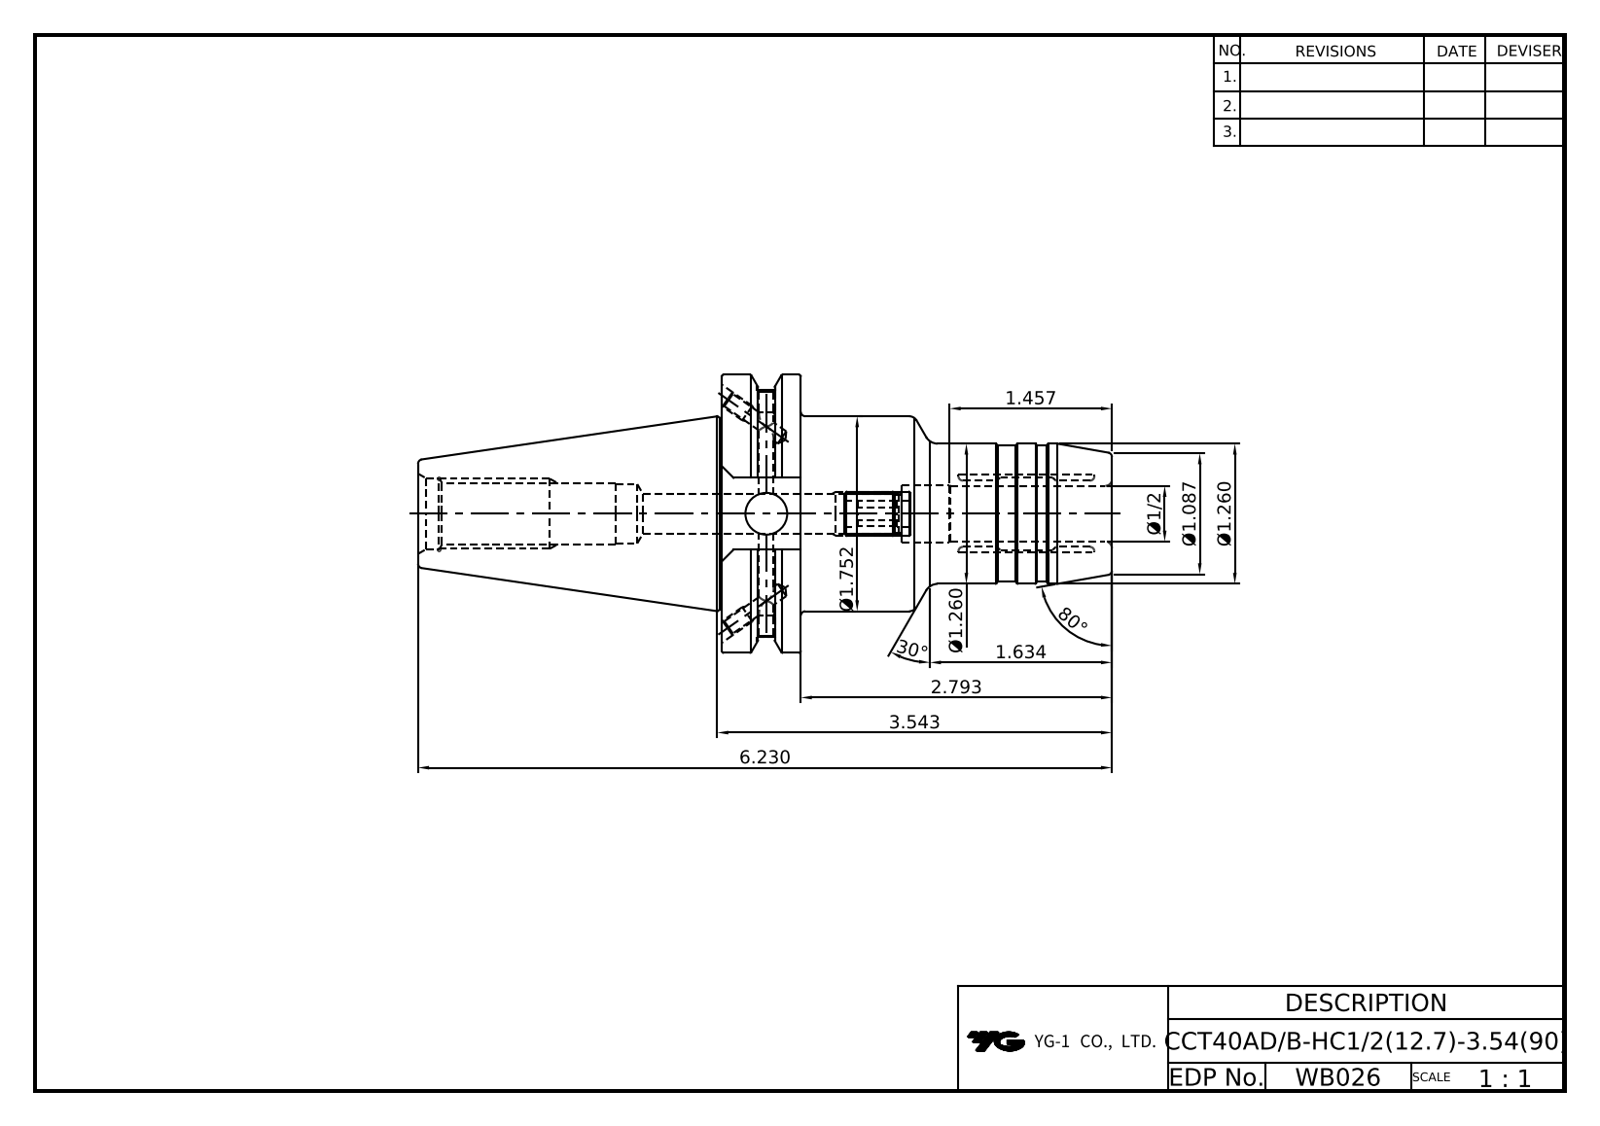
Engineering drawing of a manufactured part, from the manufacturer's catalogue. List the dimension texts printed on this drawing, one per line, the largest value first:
80°
30°
6.230
3.543
2.793
Ø1.752
1.634
1.457
Ø1.260
Ø1.260
Ø1.087
Ø1/2
